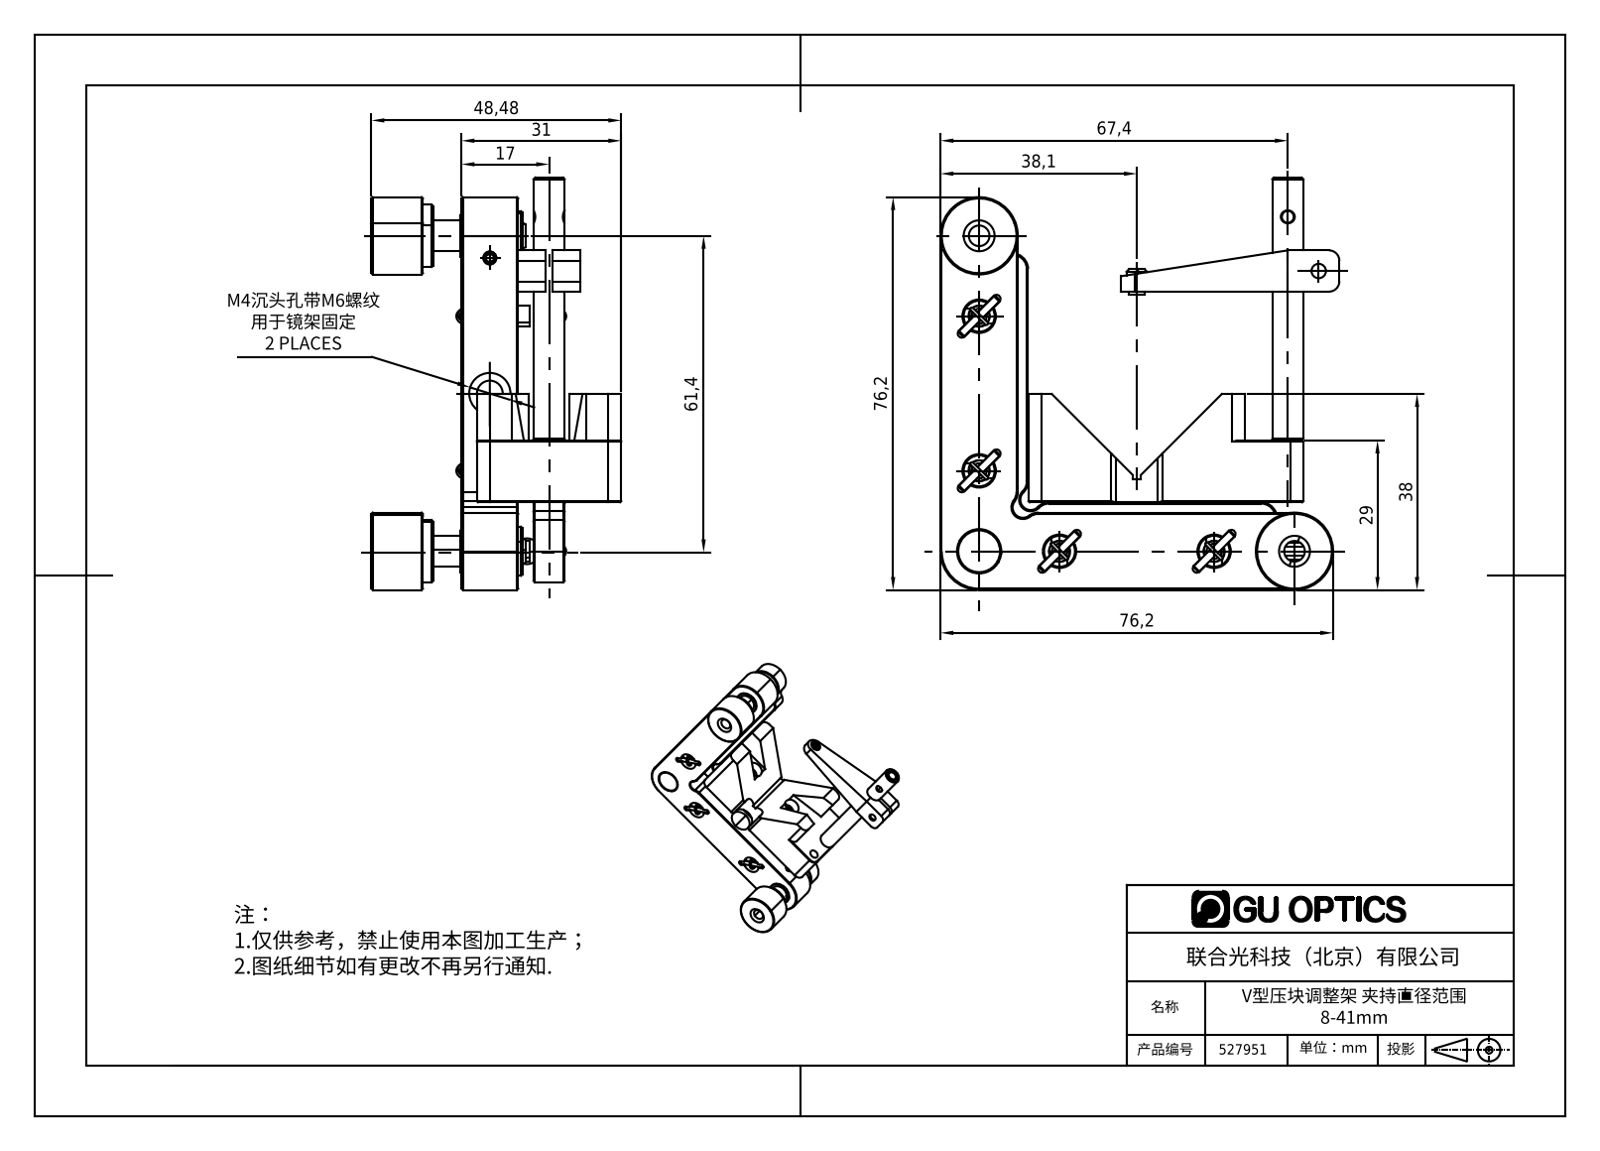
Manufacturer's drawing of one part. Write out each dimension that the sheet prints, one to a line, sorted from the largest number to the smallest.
76,2
76,2
67,4
61,4
48,48
38,1
38
31
29
17
M4沉头孔带M6螺纹 用于镜架固定 2 PLACES
